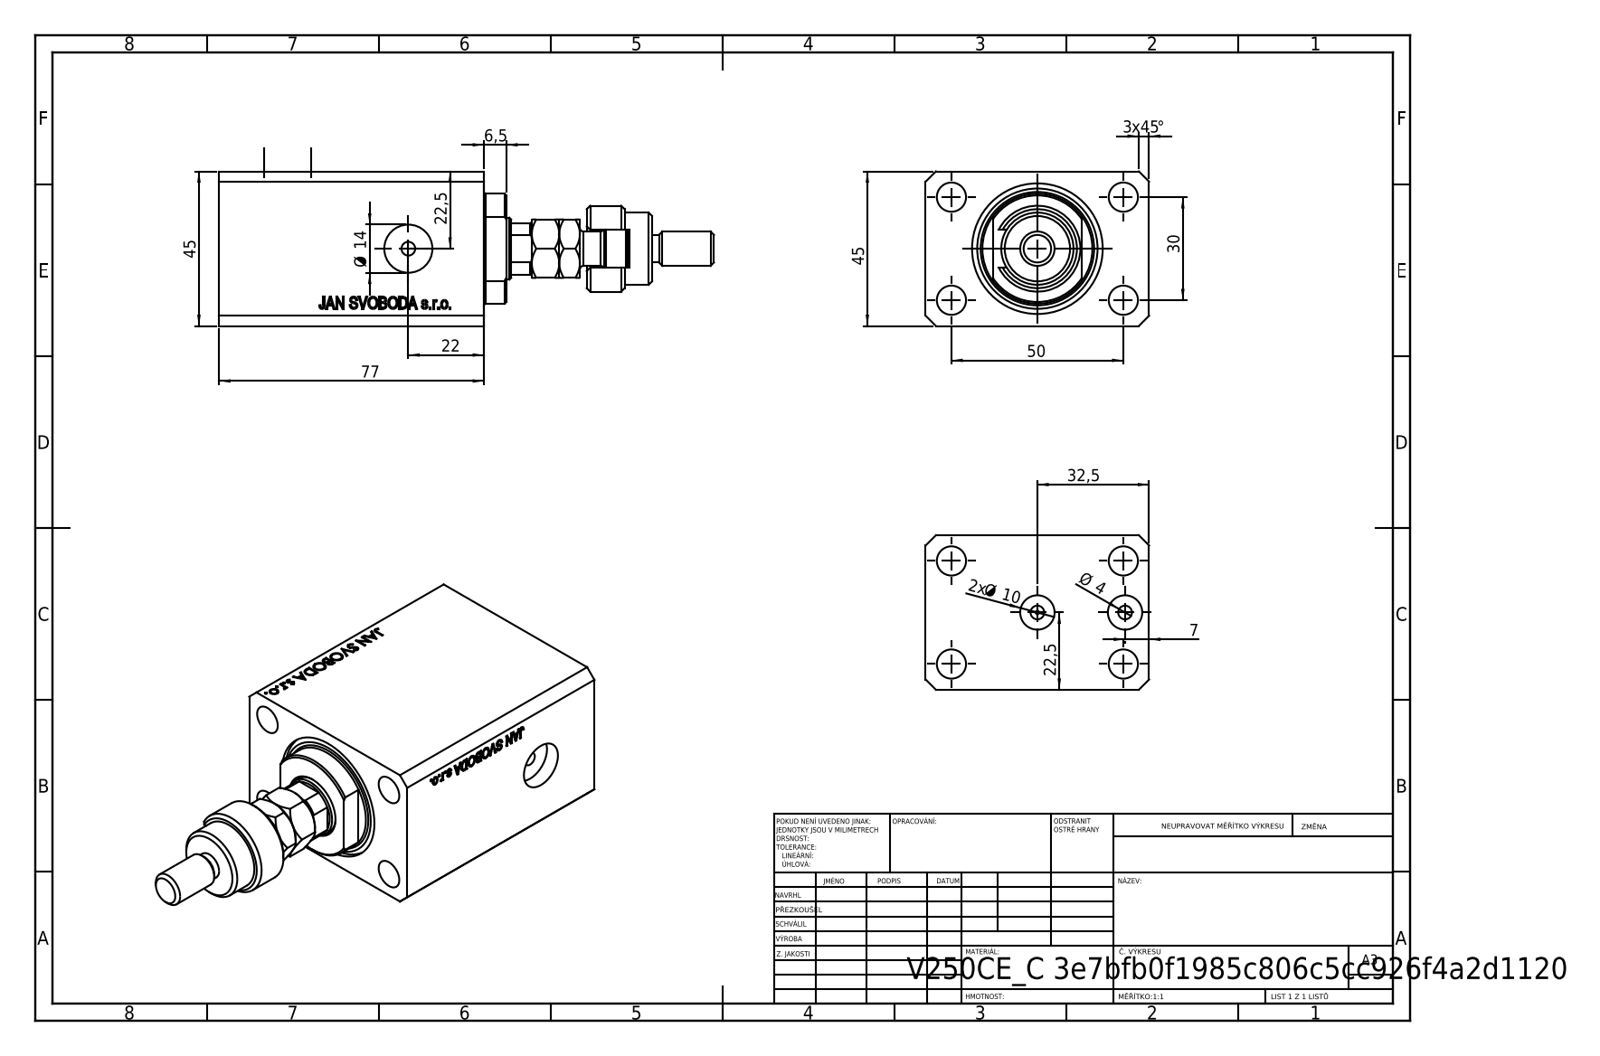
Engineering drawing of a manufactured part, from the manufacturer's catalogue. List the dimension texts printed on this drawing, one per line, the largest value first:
77
50
45
3 x45 °
45
32,5
30
22,5
22,5
22
Ø 14
2x Ø 10
7
6,5
Ø 4
